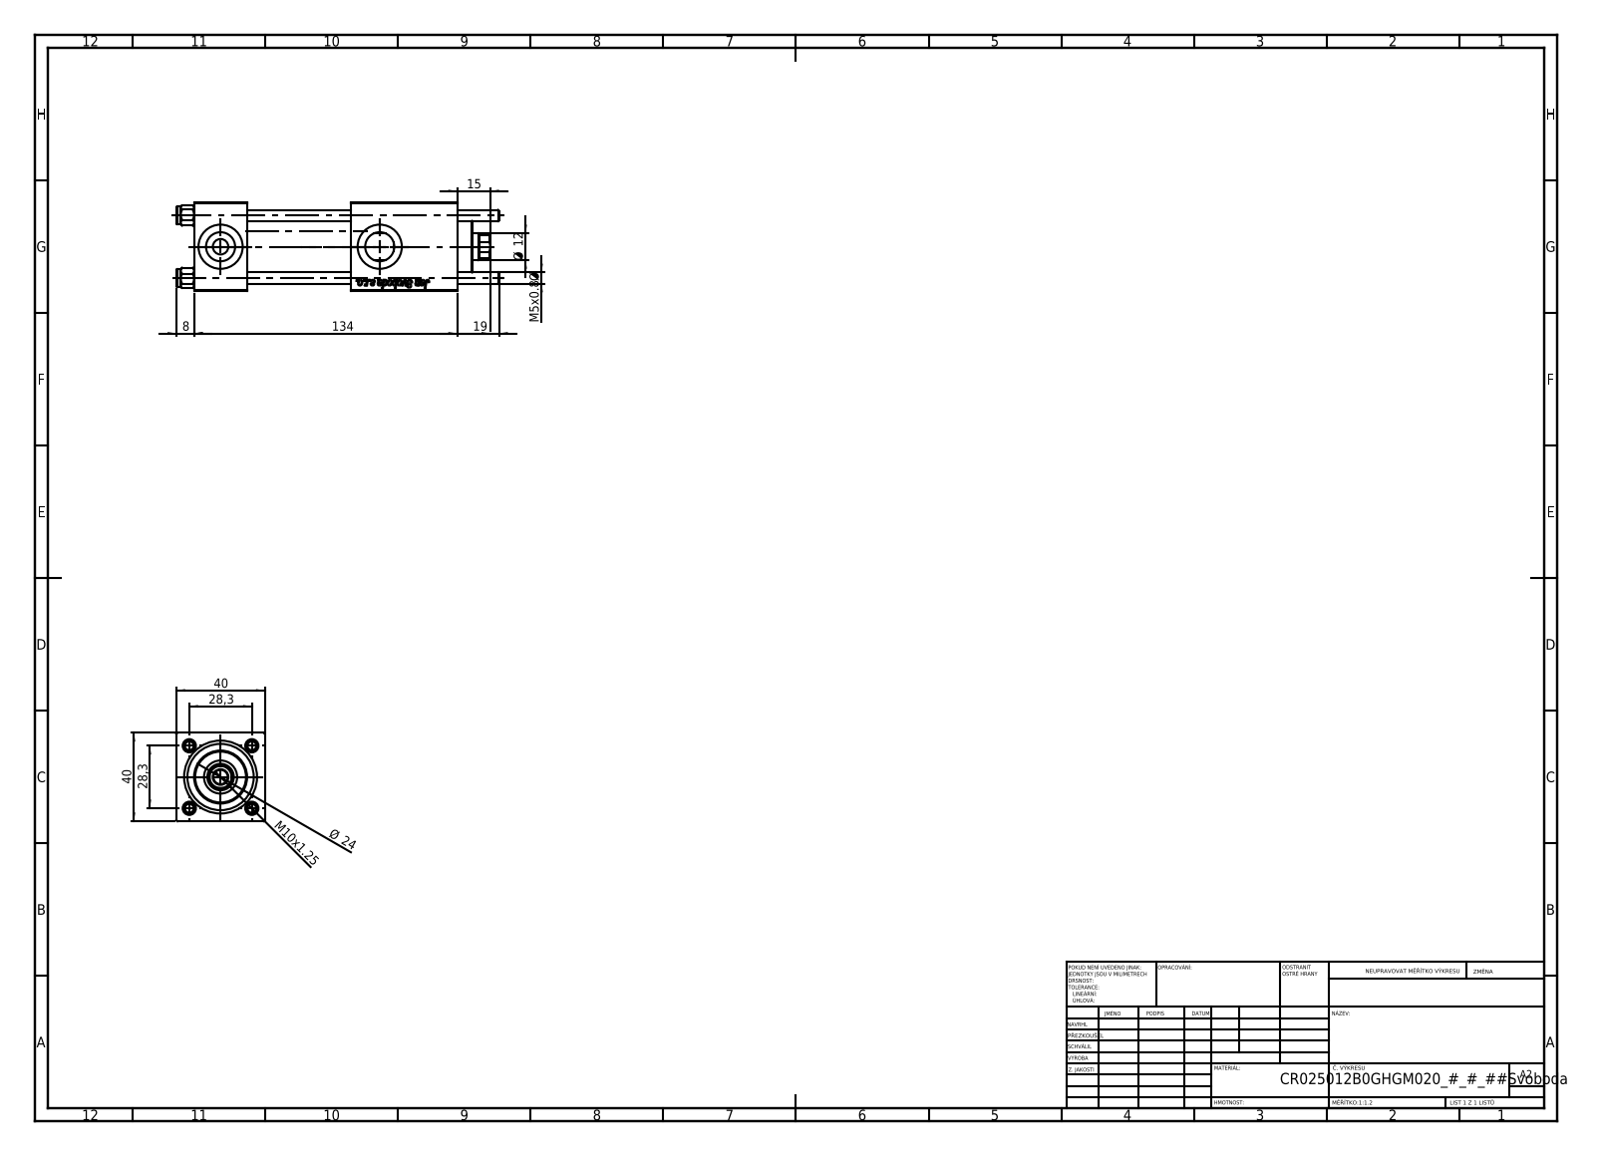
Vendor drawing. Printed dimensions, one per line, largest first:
134
40
40
28,3
28,3
Ø 24
19
15
Ø 12
M10x1.25
8
M5x0.8 Ø
